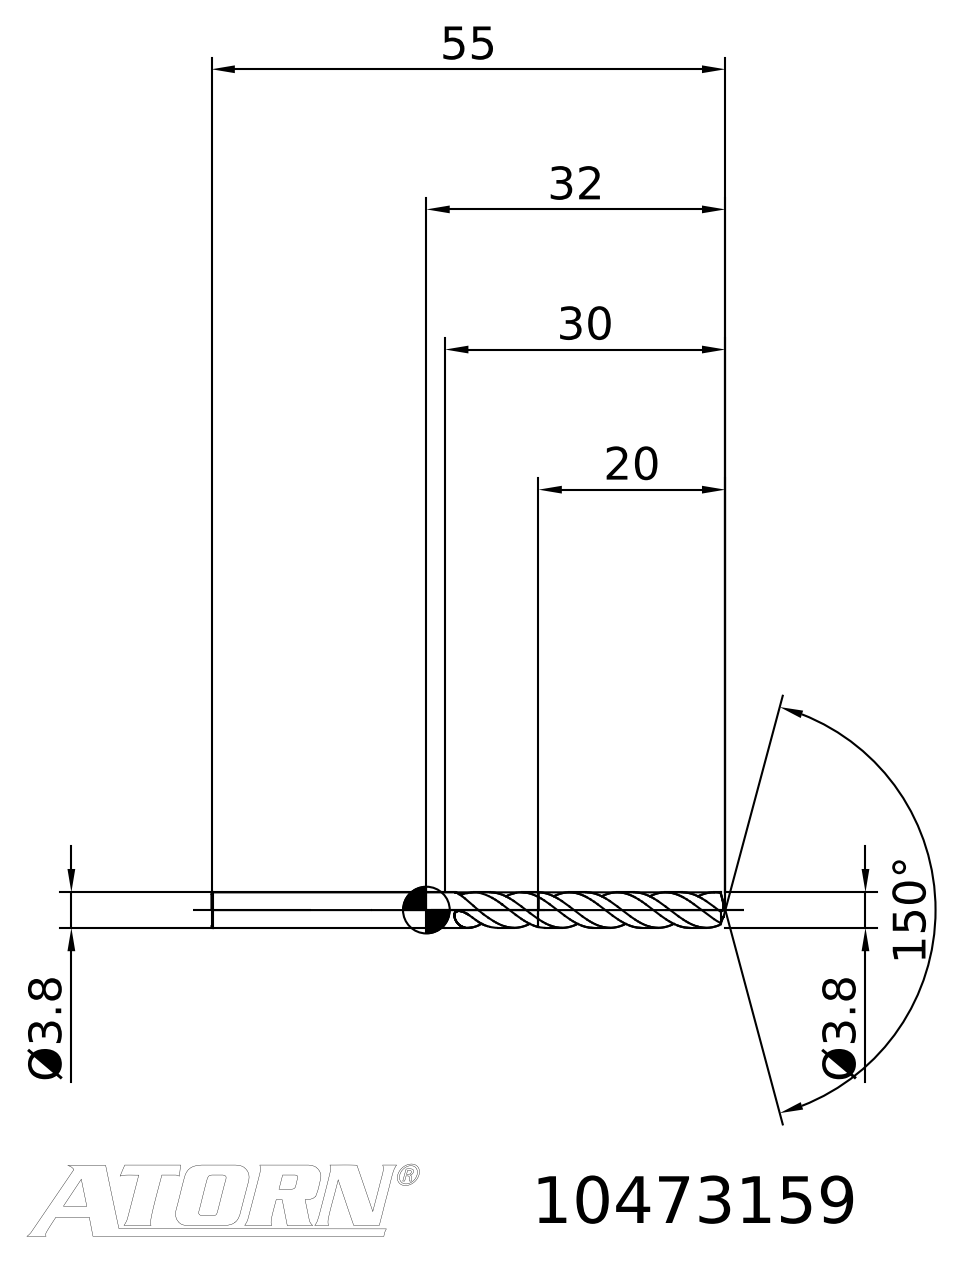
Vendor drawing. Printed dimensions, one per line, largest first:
150°
55
32
30
20
Ø3.8
Ø3.8
